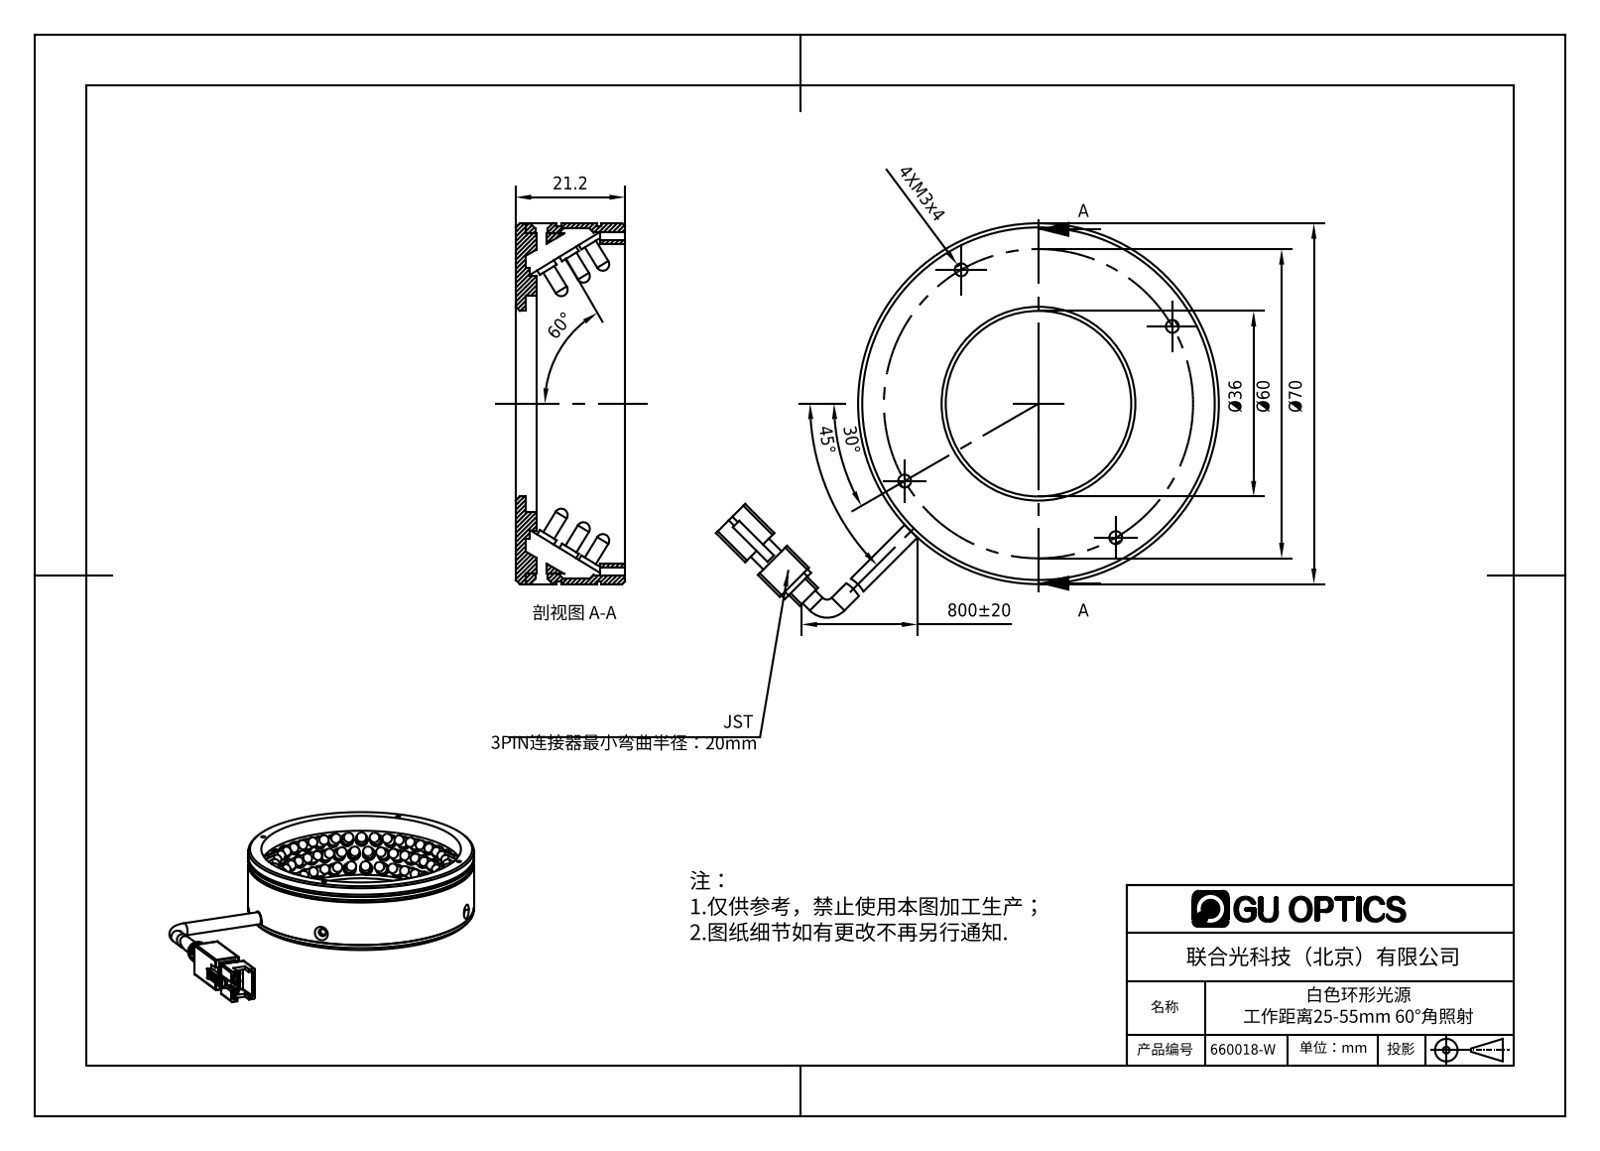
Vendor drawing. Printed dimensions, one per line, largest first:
800±20
Ø70
Ø60
60°
45°
Ø36
30°
21.2
4XM3x4
